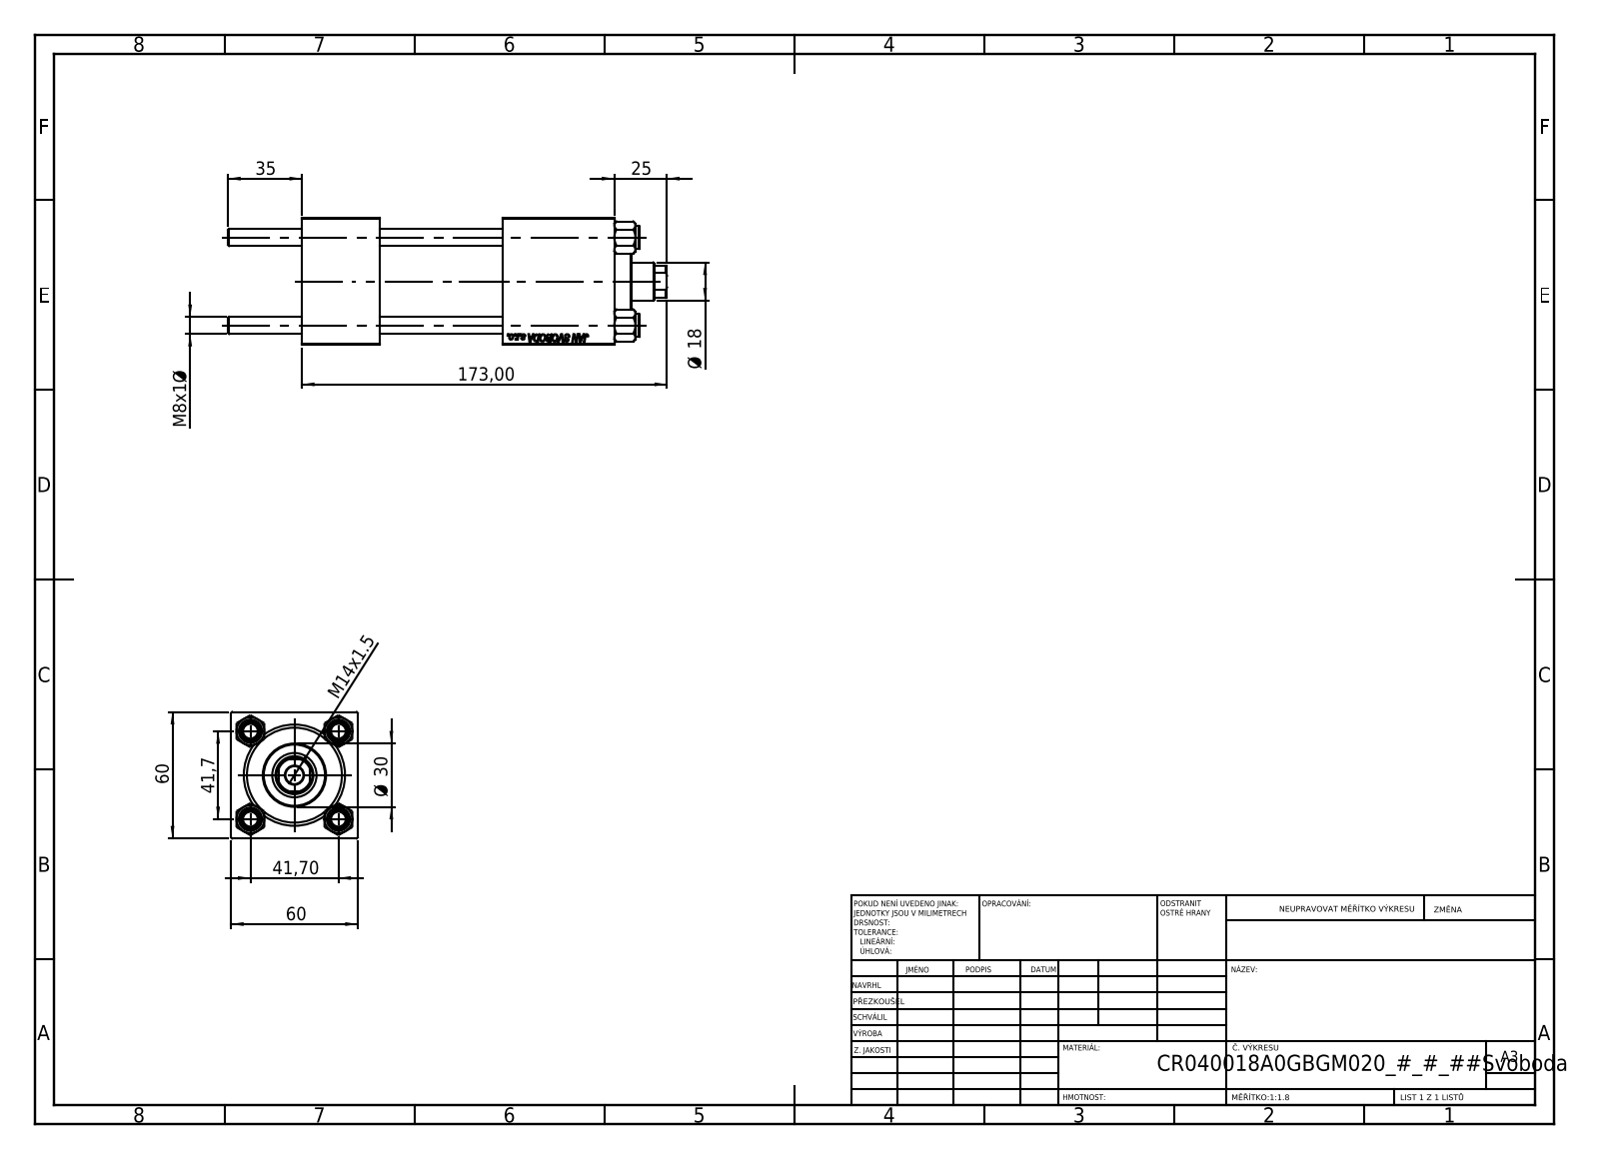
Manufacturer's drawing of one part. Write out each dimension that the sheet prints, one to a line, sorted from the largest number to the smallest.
173,00
60
60
41,7
41,70
35
Ø 30
25
Ø 18
M14x1.5
M8x1 Ø
